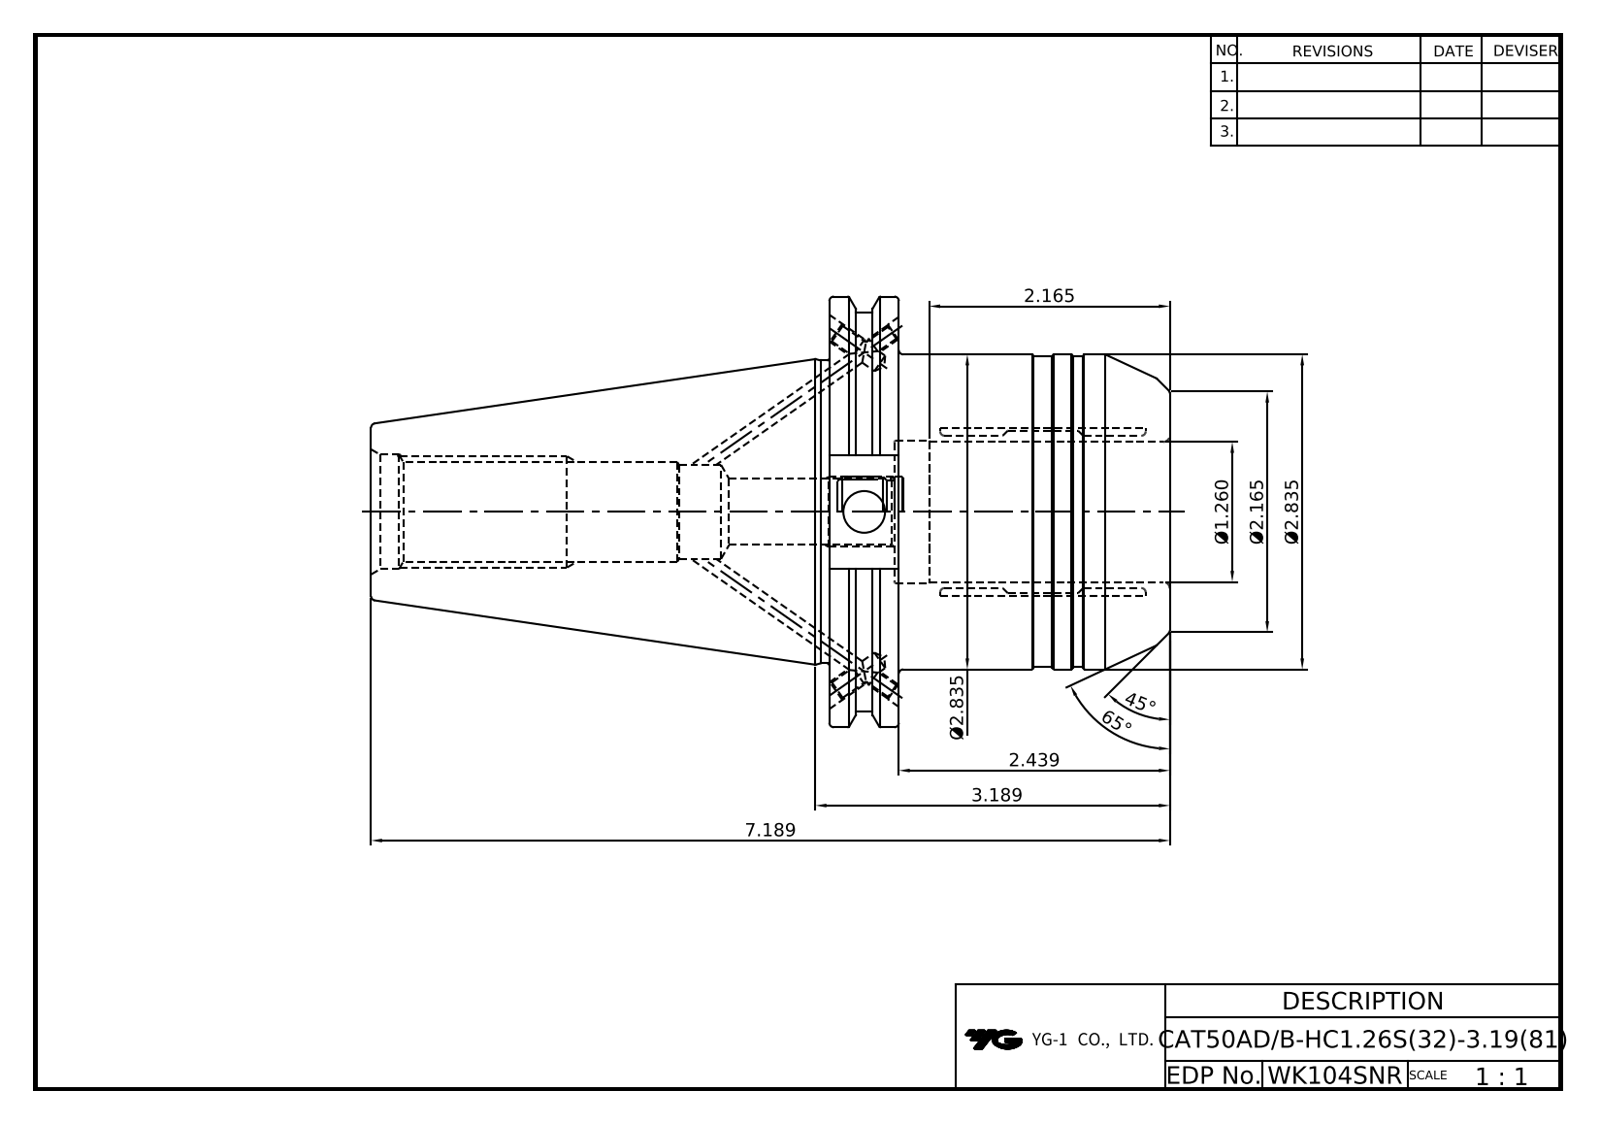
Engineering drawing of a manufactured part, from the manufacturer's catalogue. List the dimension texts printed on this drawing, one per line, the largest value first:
65°
45°
7.189
3.189
Ø2.835
Ø2.835
2.439
Ø2.165
2.165
Ø1.260
